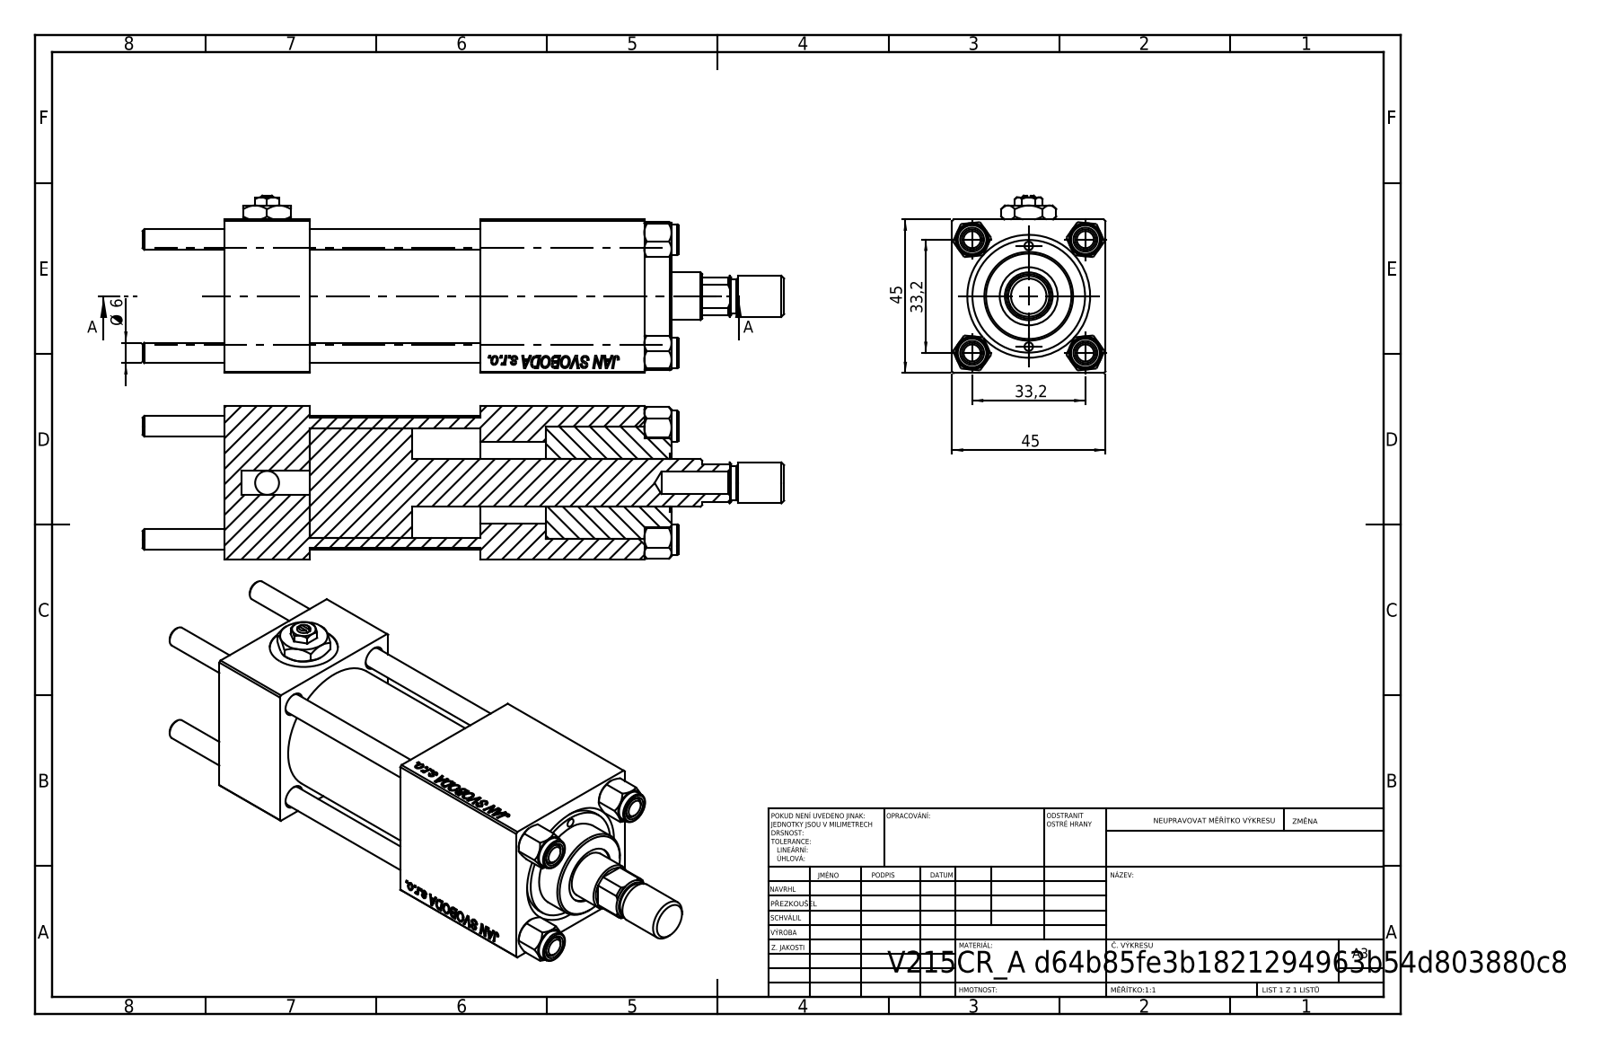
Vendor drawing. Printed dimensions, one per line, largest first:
45
45
33,2
33,2
Ø 6
